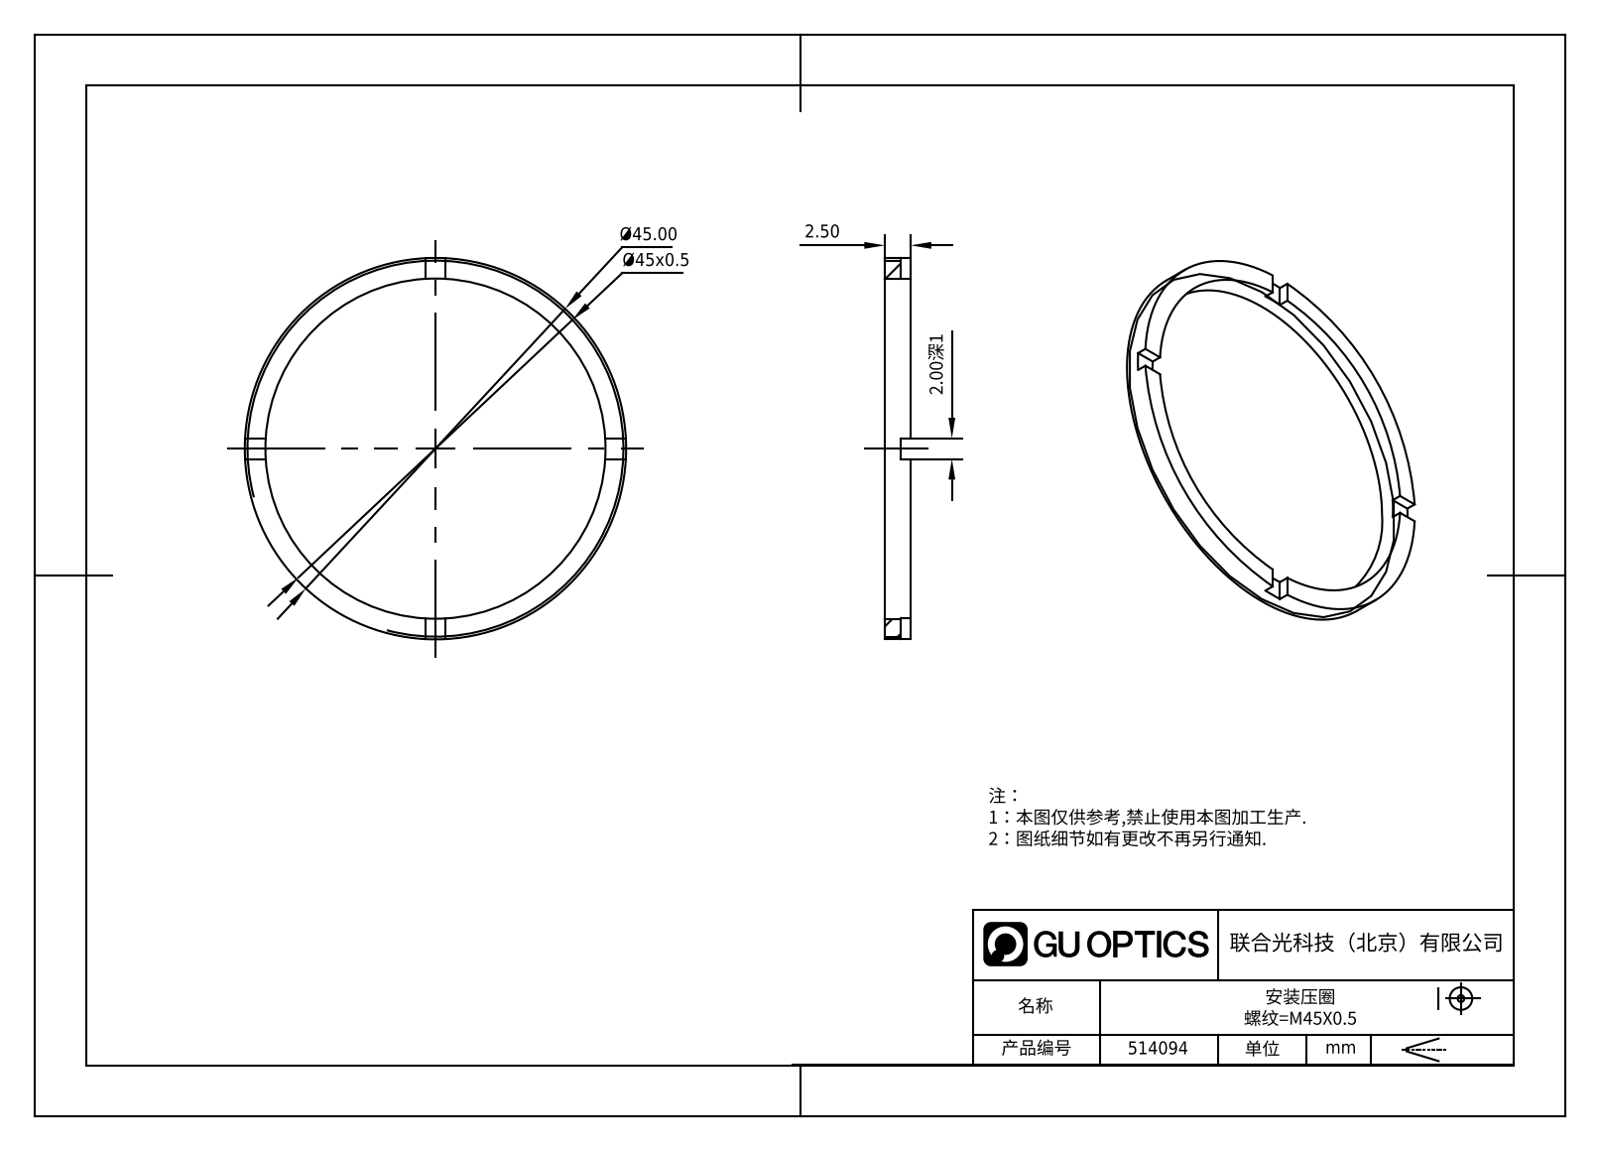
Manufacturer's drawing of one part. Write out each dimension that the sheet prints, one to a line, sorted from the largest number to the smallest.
Ø45.00
Ø45x0.5
2.50
2.00深1
